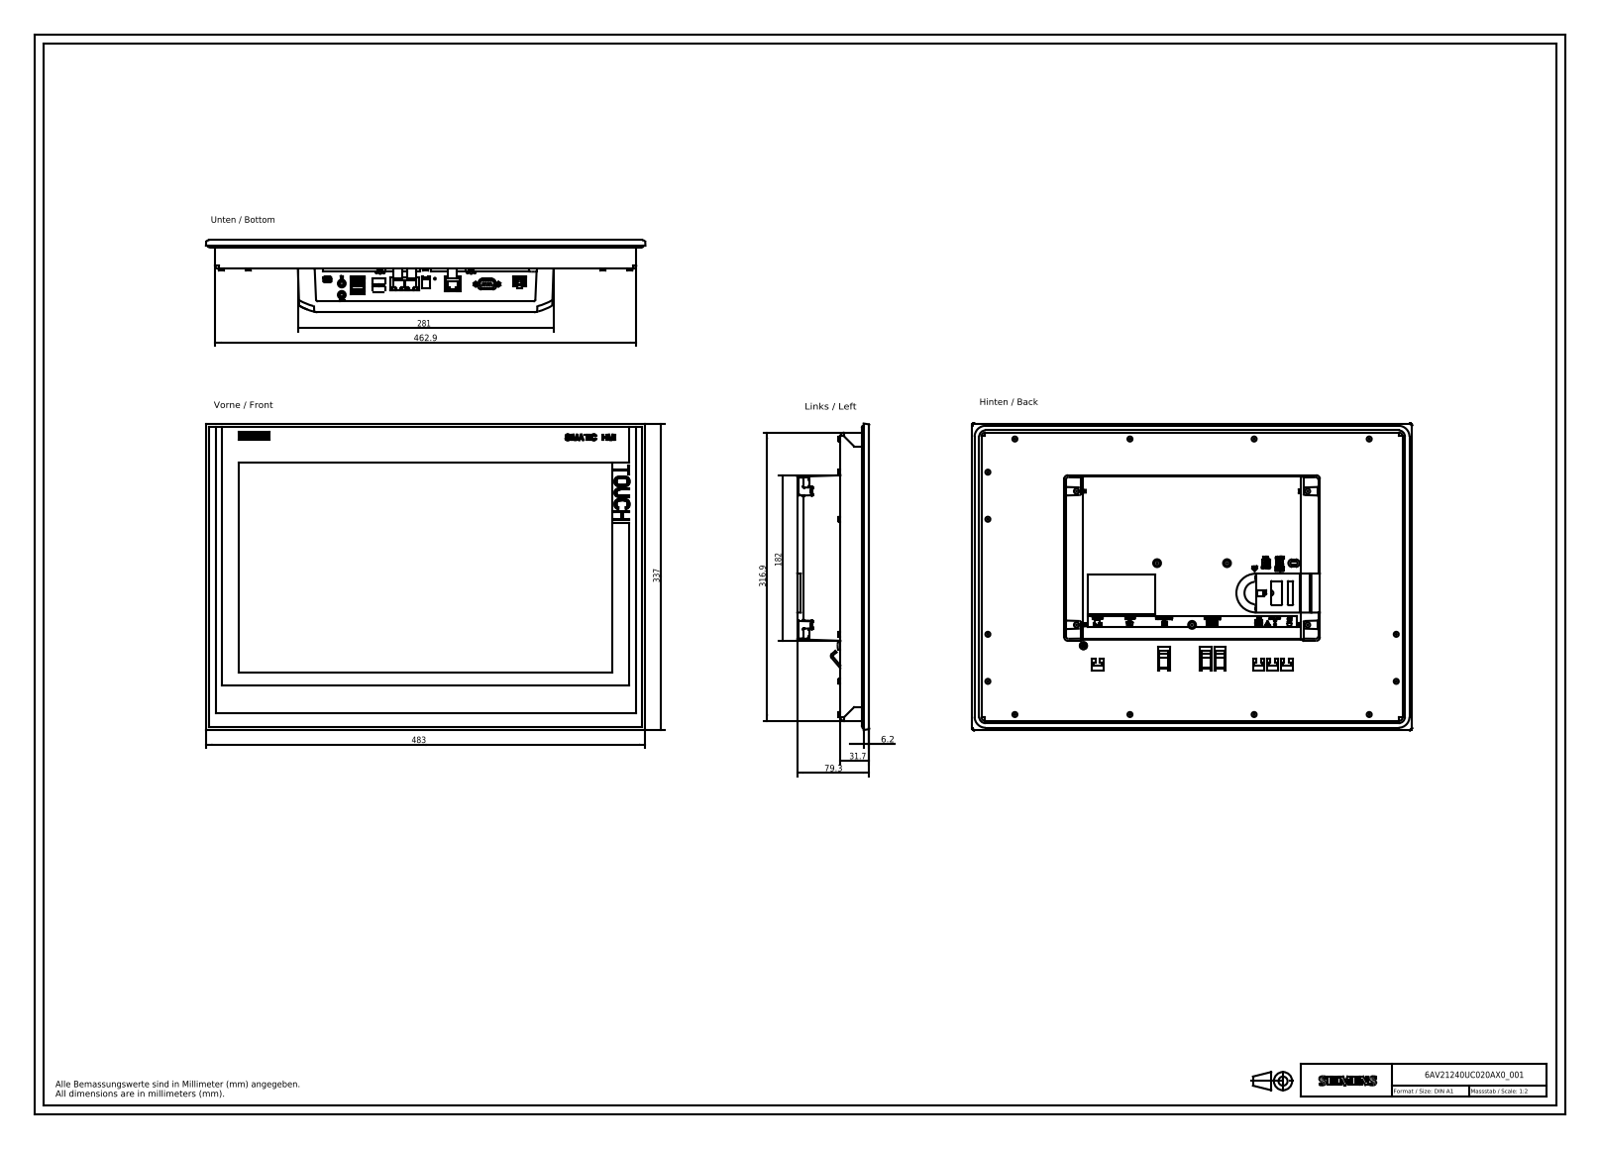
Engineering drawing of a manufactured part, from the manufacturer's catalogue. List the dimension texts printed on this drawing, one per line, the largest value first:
483
462.9
337
316.9
281
182
79.3
31.7
6.2
